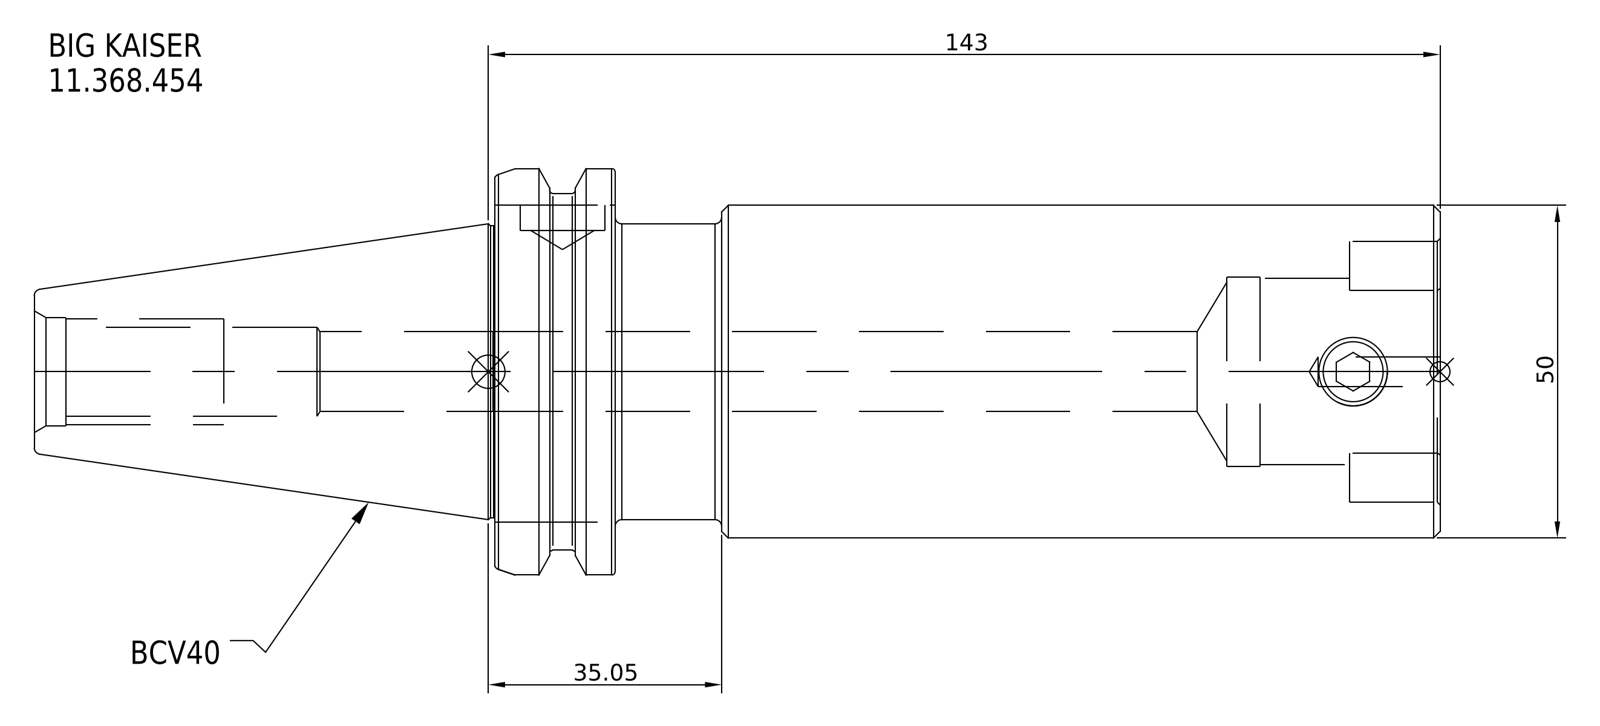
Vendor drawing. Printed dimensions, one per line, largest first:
143
50
35.05
